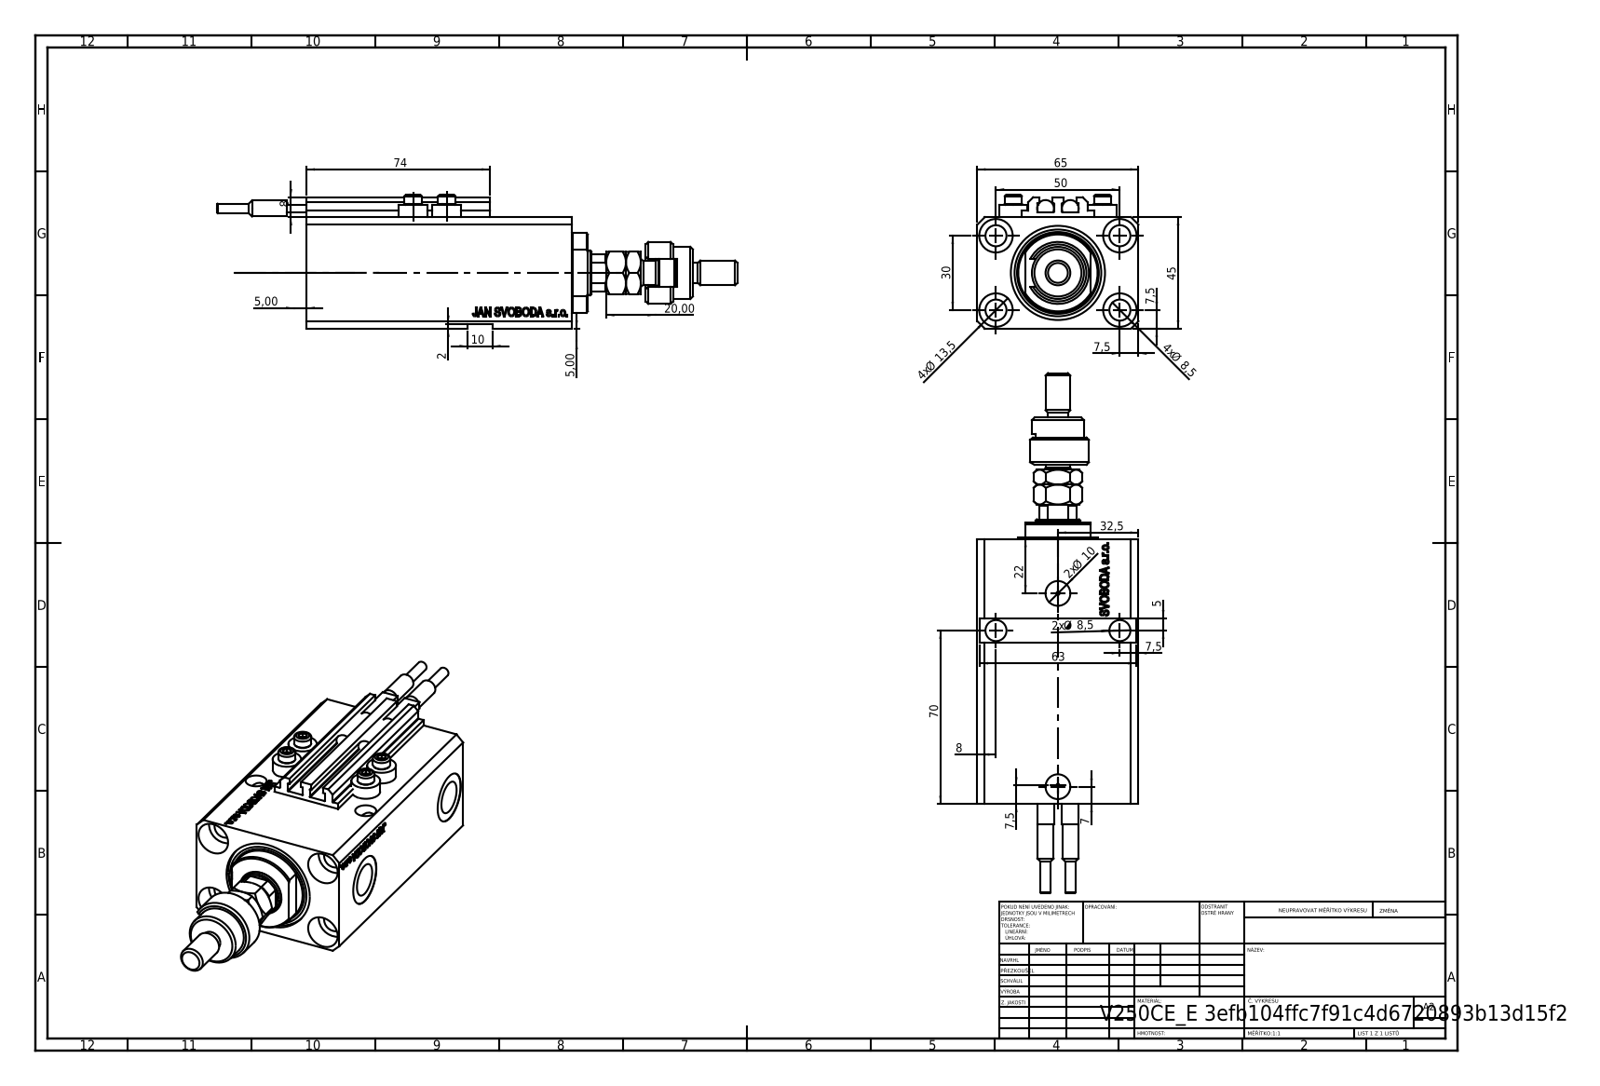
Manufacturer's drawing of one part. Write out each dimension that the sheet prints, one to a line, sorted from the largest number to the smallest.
74
70
65
63
50
45
32,5
30
22
20,00
4x Ø 13,5
10
2x Ø 10
4x Ø 8,5
2x Ø 8,5
8
8
7,5
7,5
7,5
7,5
7
5,00
5,00
5
2
